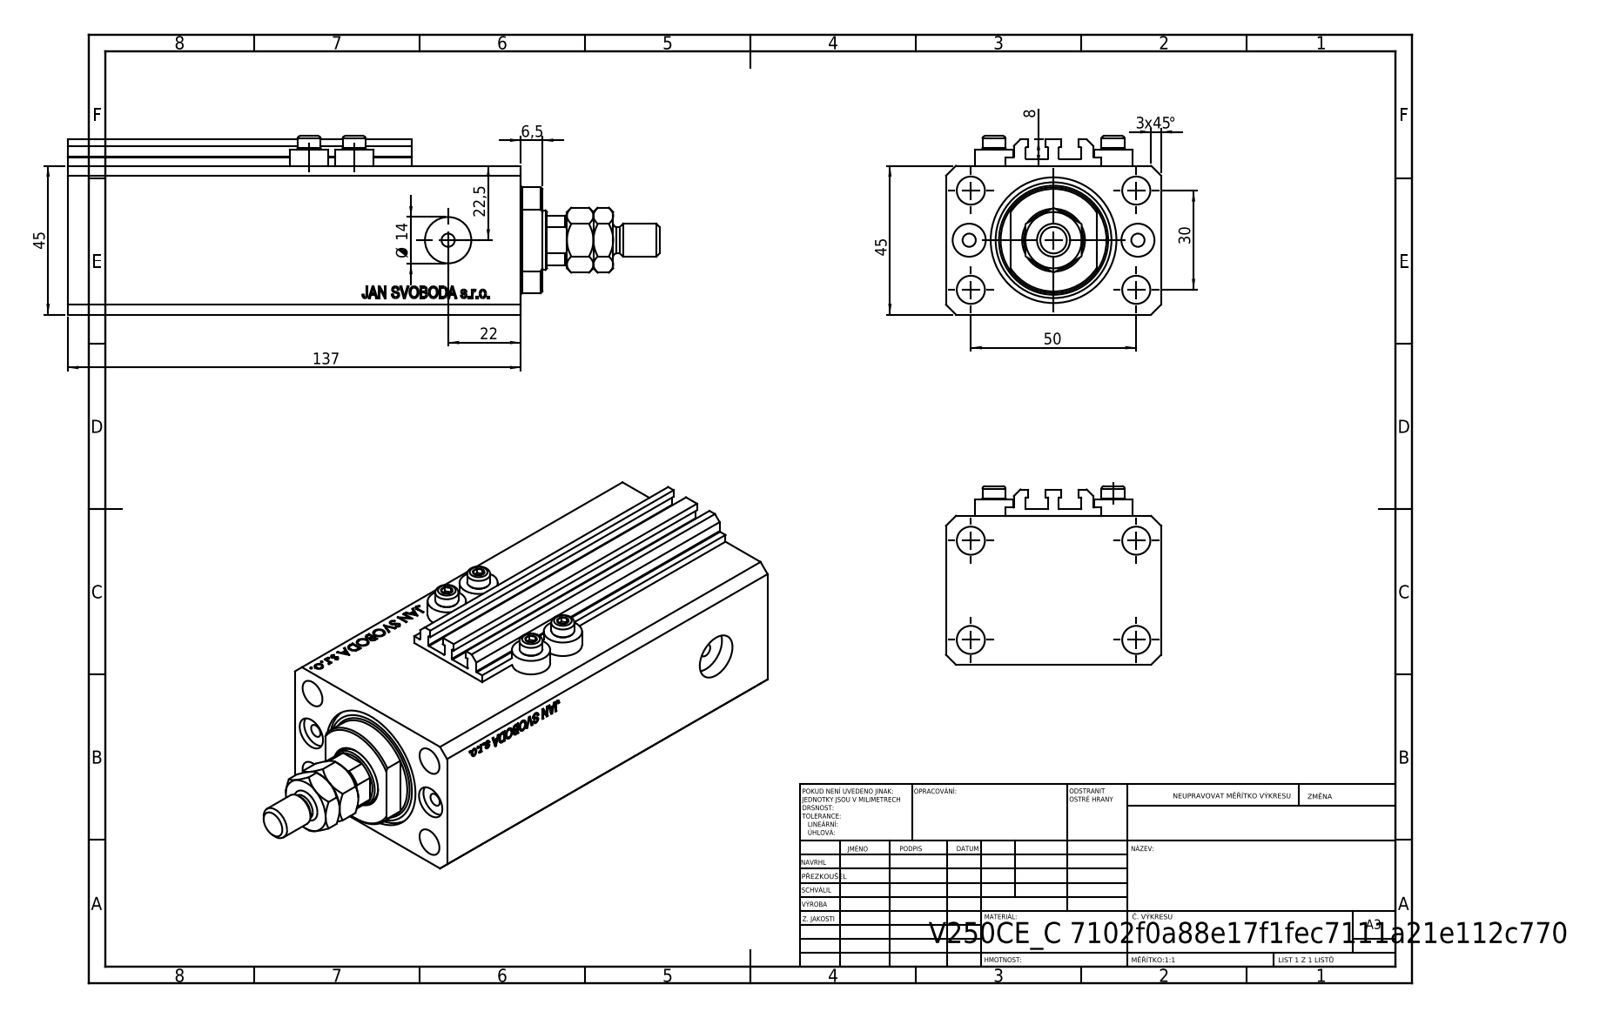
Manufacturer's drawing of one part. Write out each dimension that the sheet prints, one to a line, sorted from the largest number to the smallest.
137
50
45
3 x45 °
45
30
22,5
22
Ø 14
8
6,5
